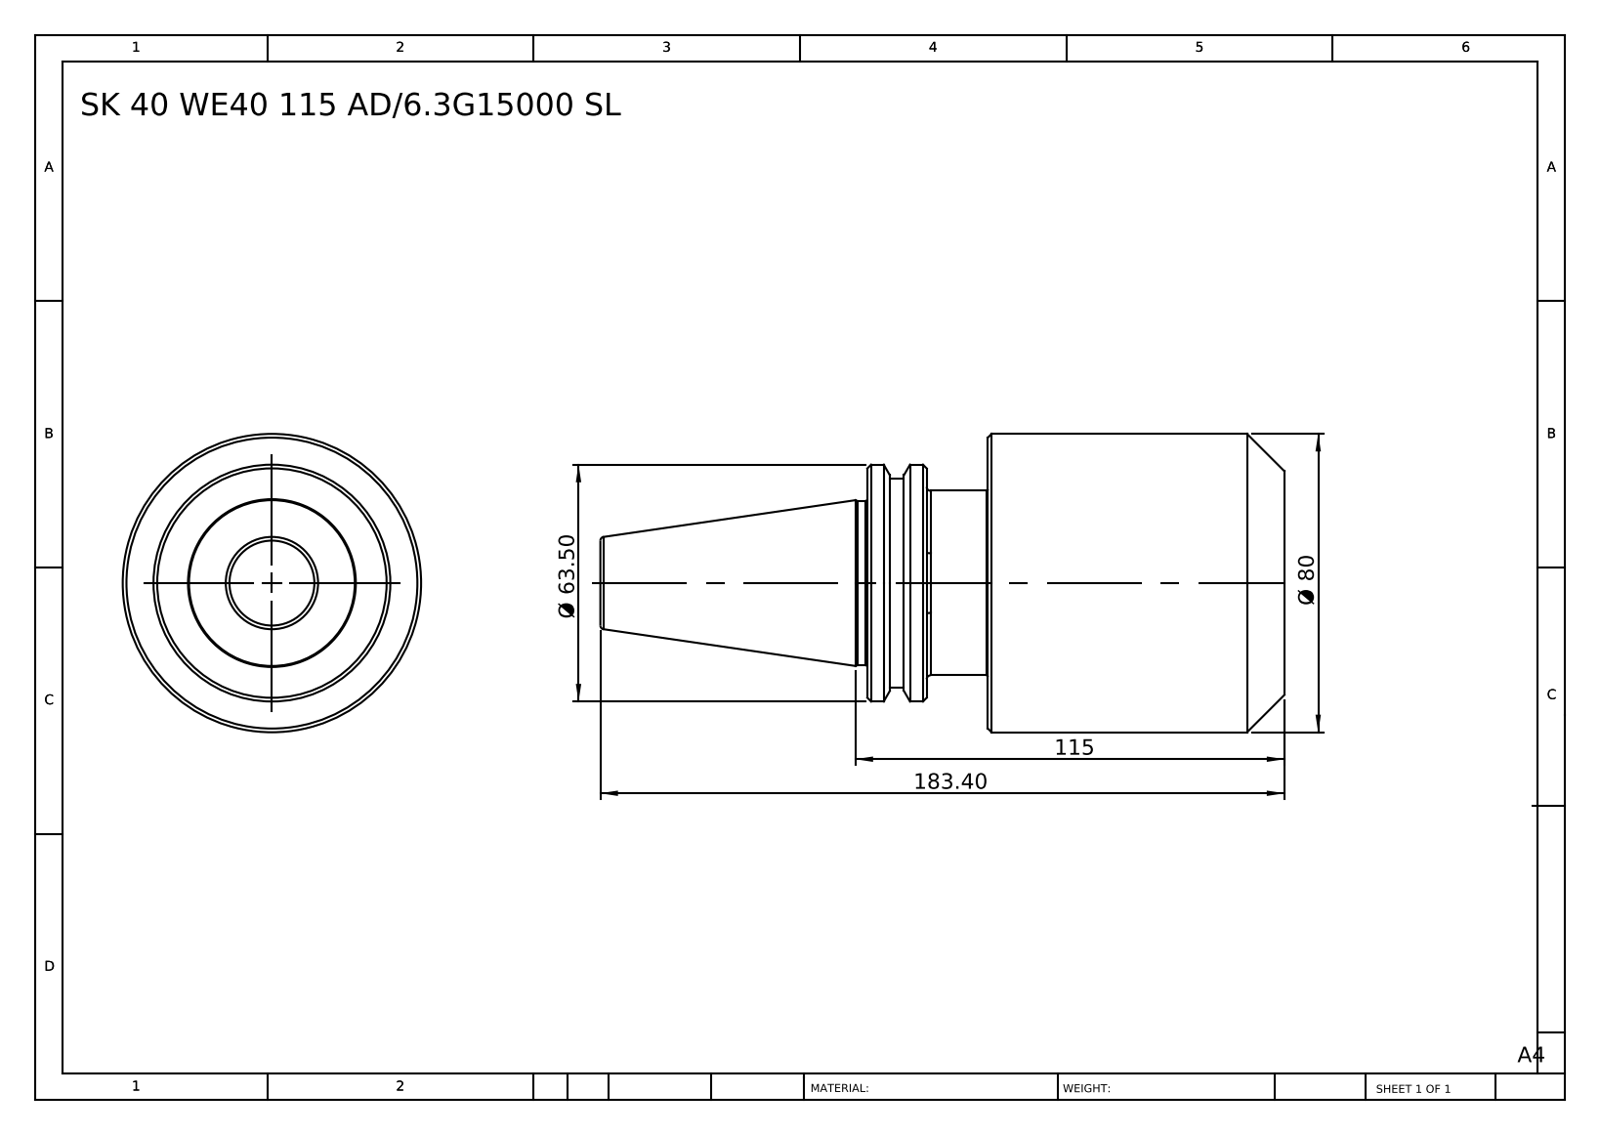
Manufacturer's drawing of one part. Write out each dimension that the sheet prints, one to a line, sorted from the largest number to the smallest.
183.40
115
Ø 80
Ø 63.50
